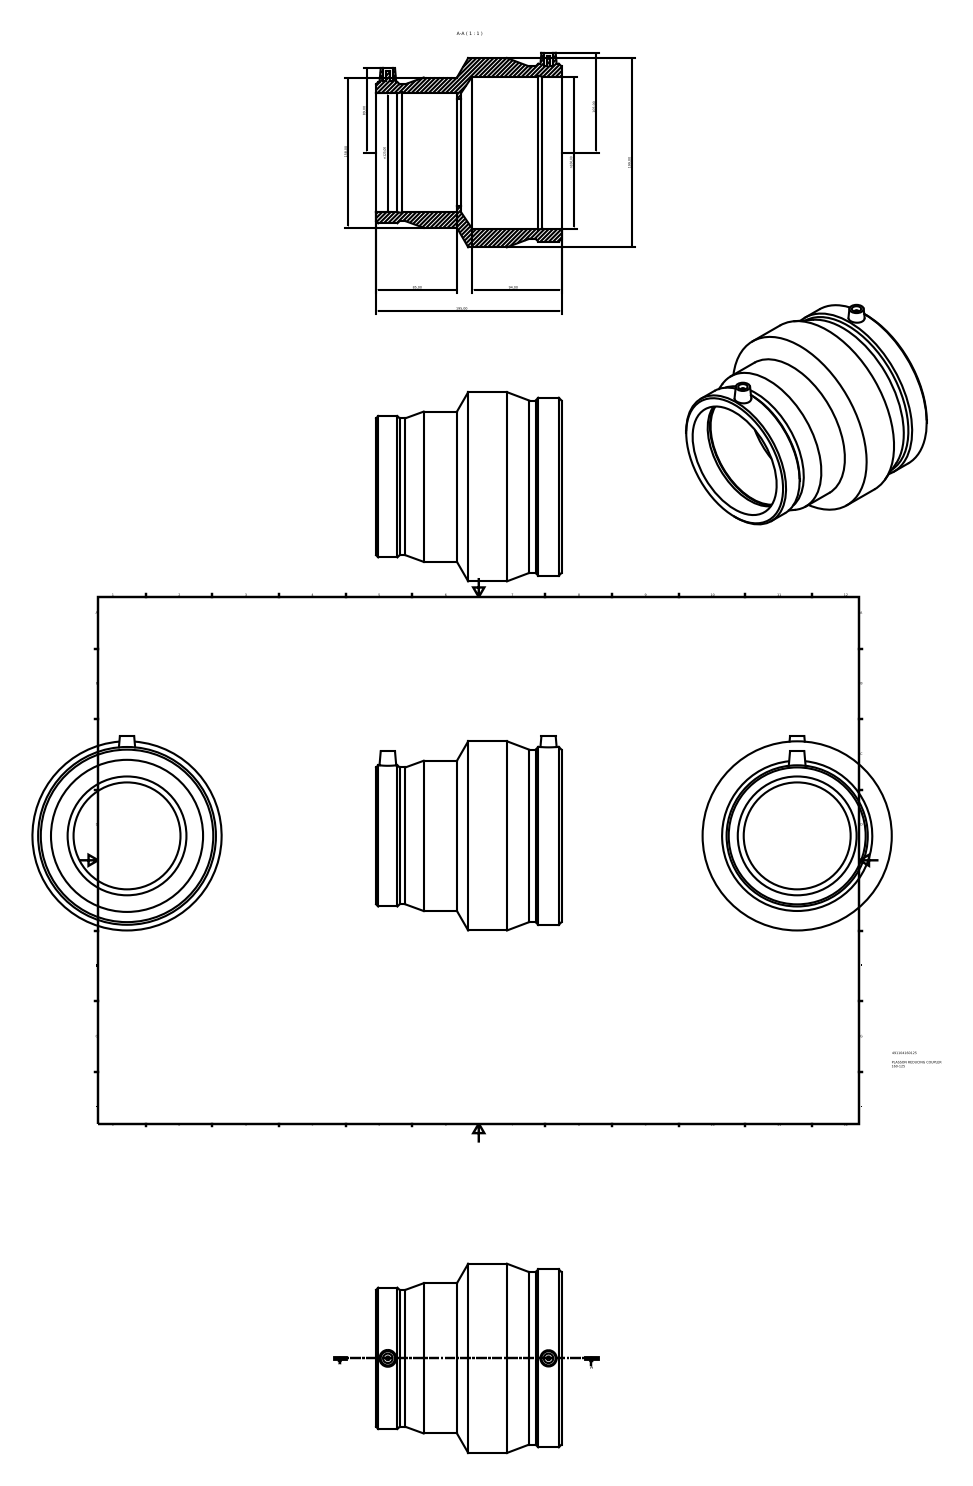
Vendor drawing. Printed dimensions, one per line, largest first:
199,00
195,00
n160,00
158,00
n125,00
105,00
94,00
89,00
85,00
